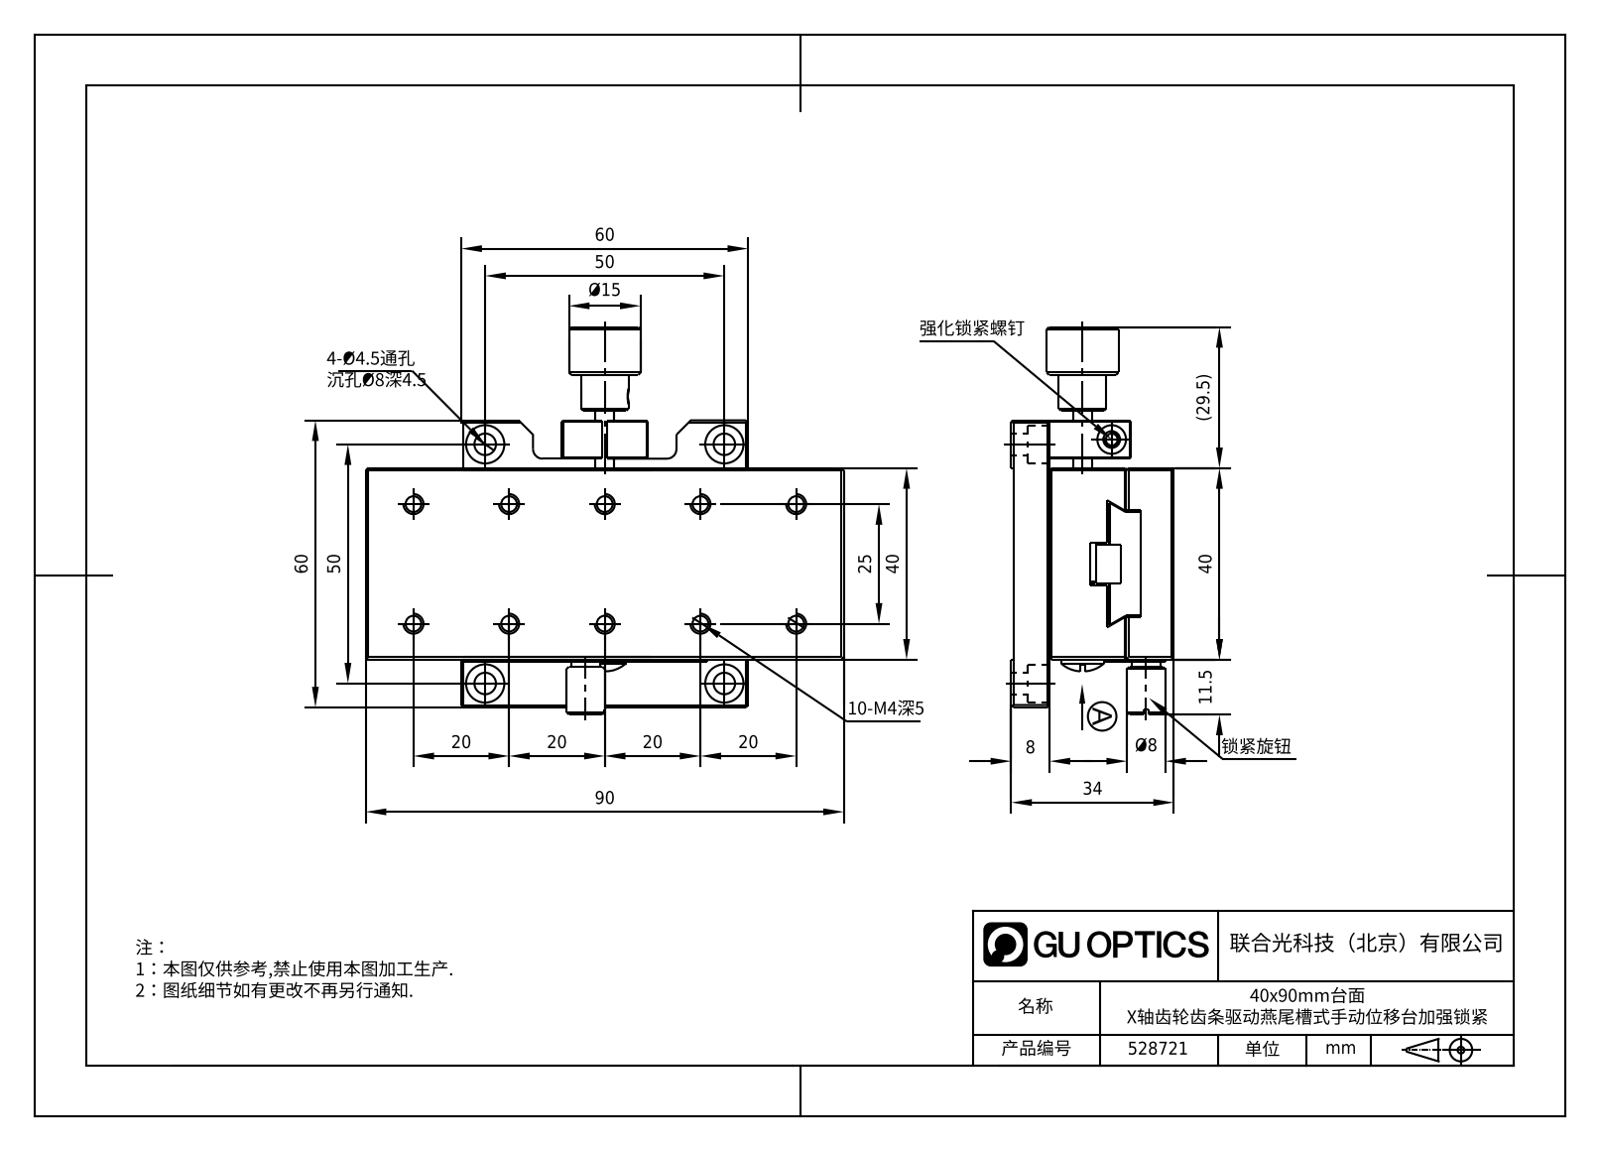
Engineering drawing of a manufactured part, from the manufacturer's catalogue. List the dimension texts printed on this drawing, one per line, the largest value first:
90
60
60
50
50
40
40
34
(29.5)
25
20
20
20
20
Ø15
11.5
8
Ø8
